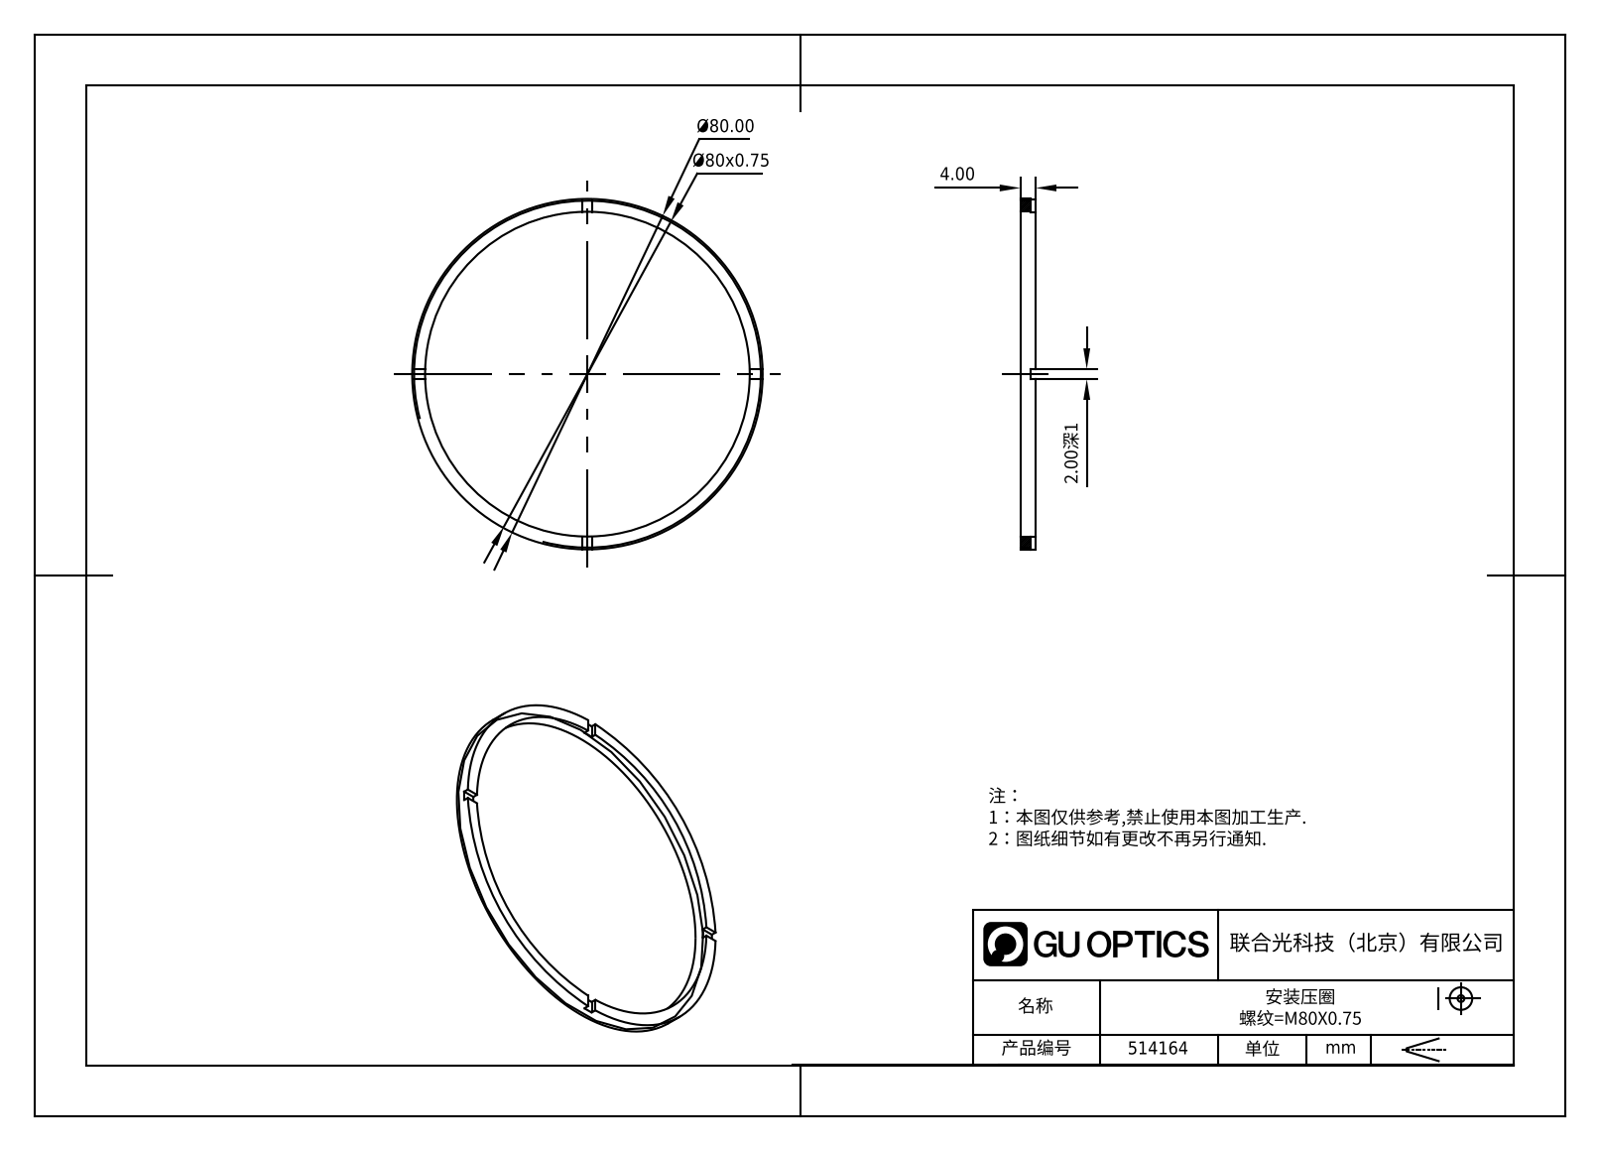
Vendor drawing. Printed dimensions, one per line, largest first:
Ø80.00
Ø80x0.75
4.00
2.00深1
